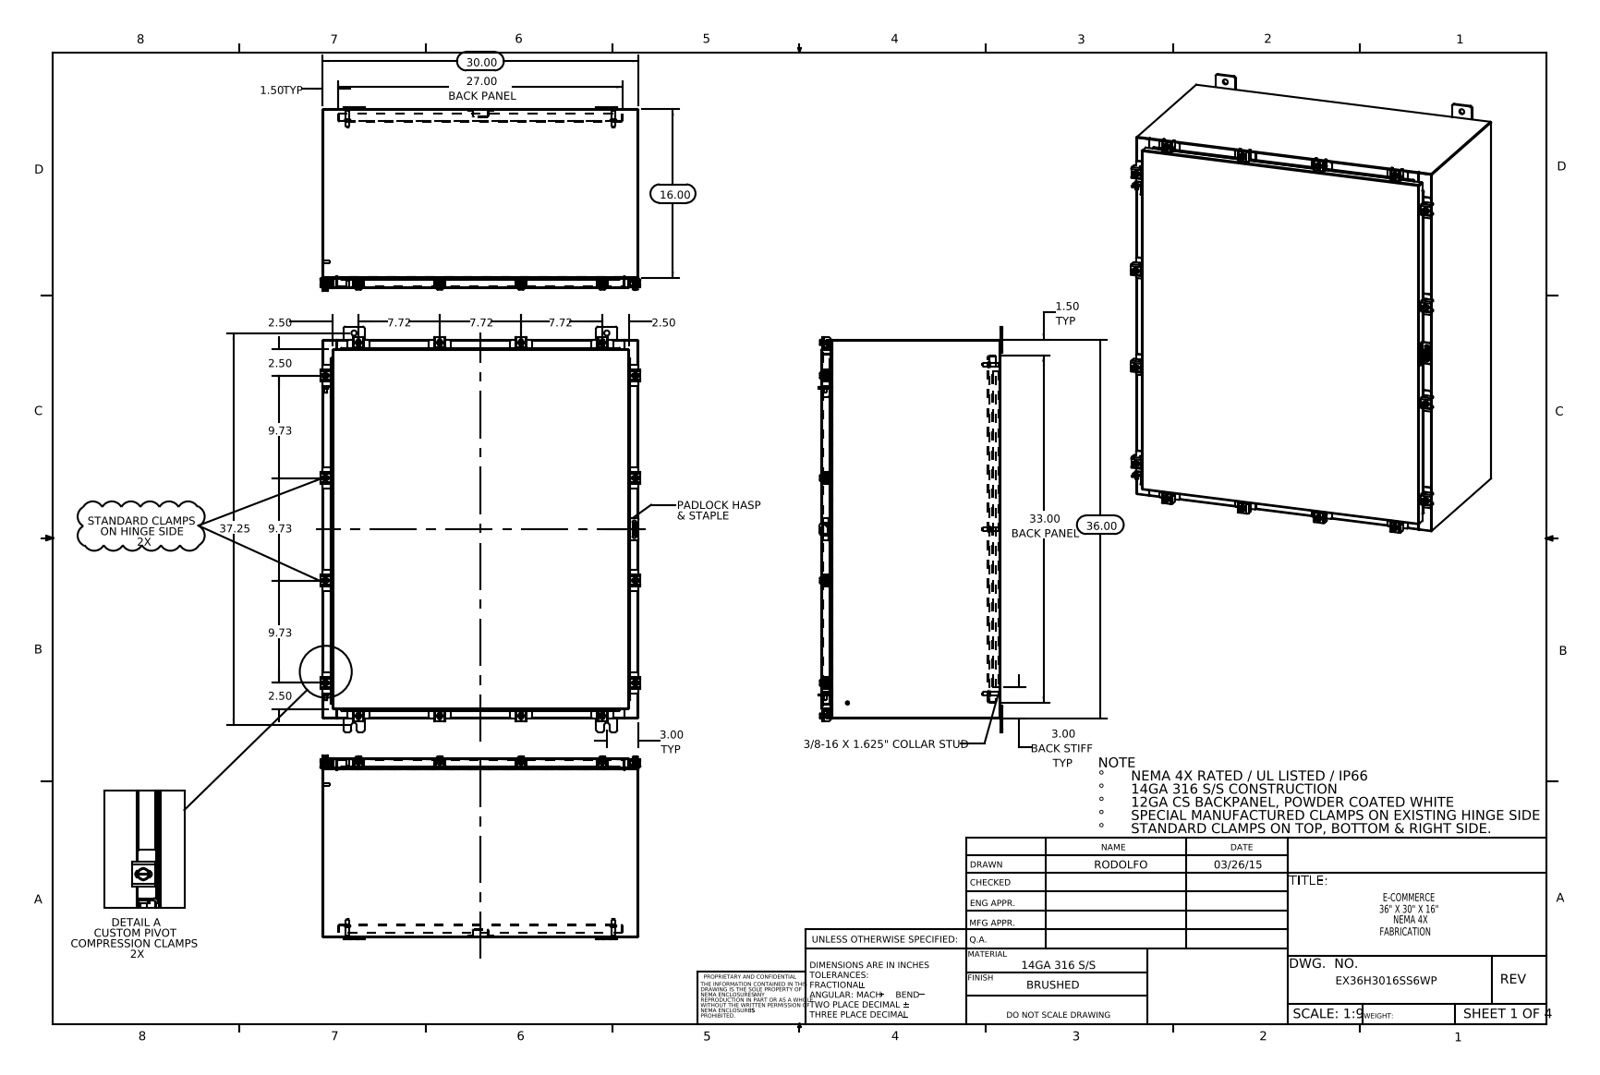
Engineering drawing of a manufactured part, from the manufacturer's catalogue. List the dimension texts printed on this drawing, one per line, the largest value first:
37.25
36.00
33.00 BACK PANEL
30.00
27.00 BACK PANEL
16.00
9.73
9.73
9.73
7.72
7.72
7.72
3.00 TYP
3.00 BACK STIFF TYP
2.50
2.50
2.50
2.50
1.50 TYP
1.50 TYP
